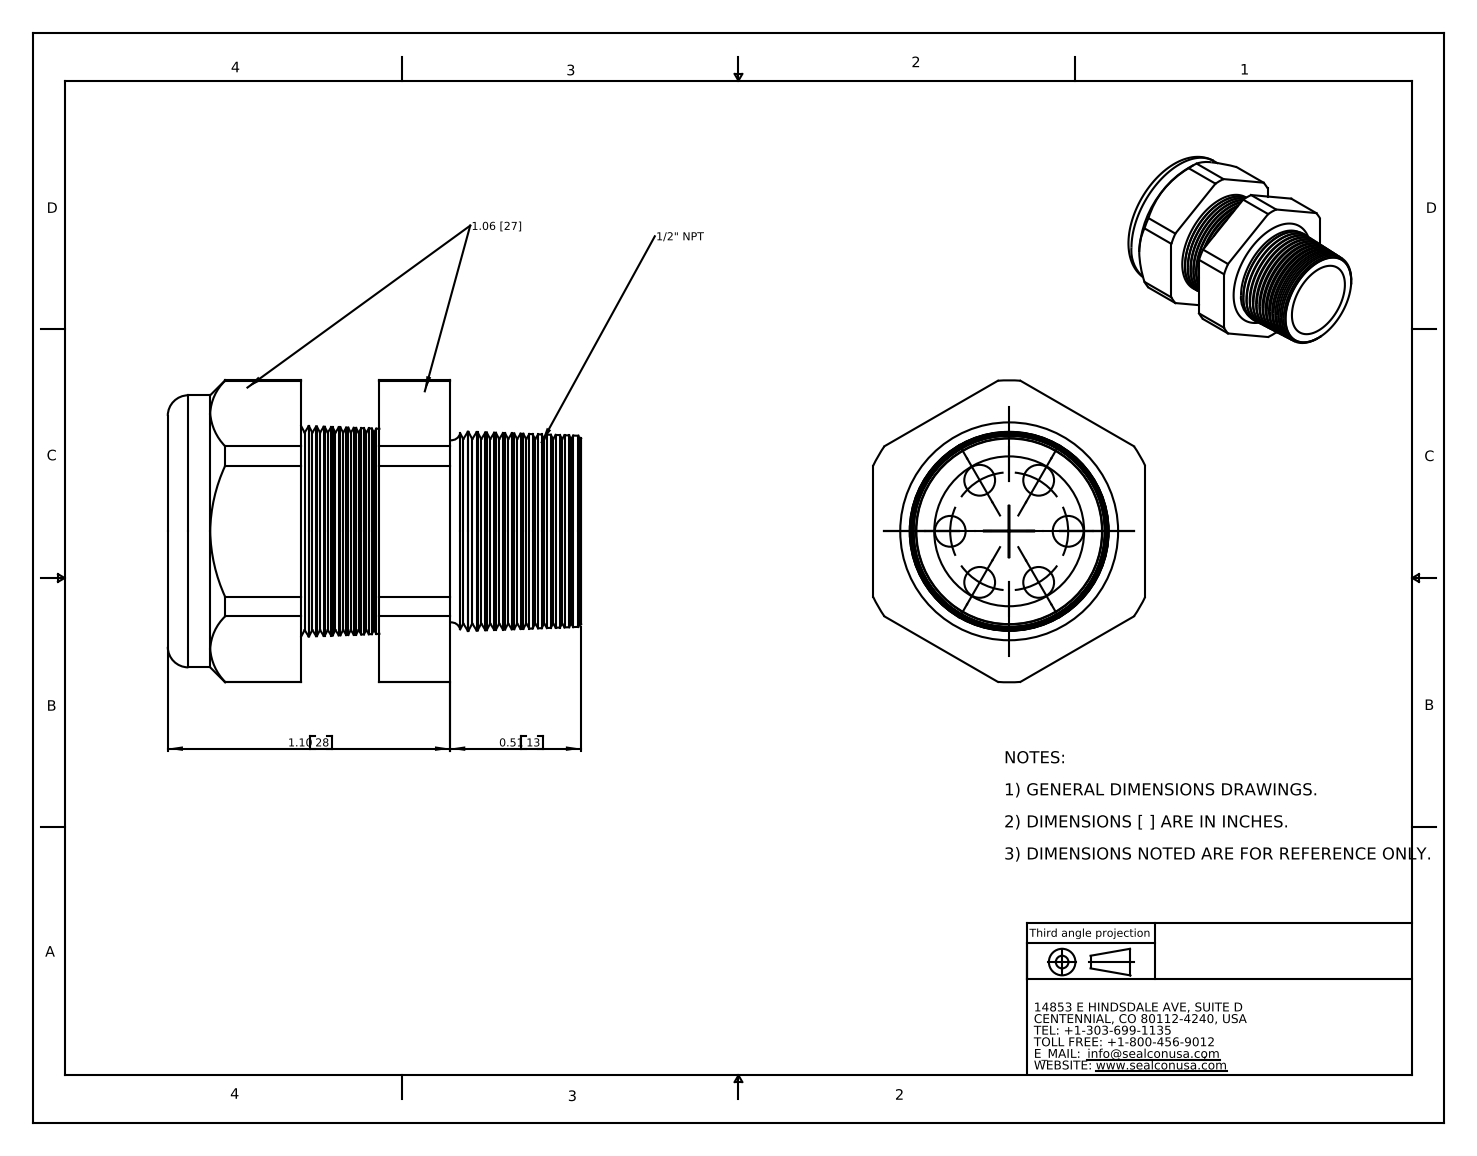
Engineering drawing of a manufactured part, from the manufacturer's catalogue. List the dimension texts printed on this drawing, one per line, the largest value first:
1.10 28
0.51 13
